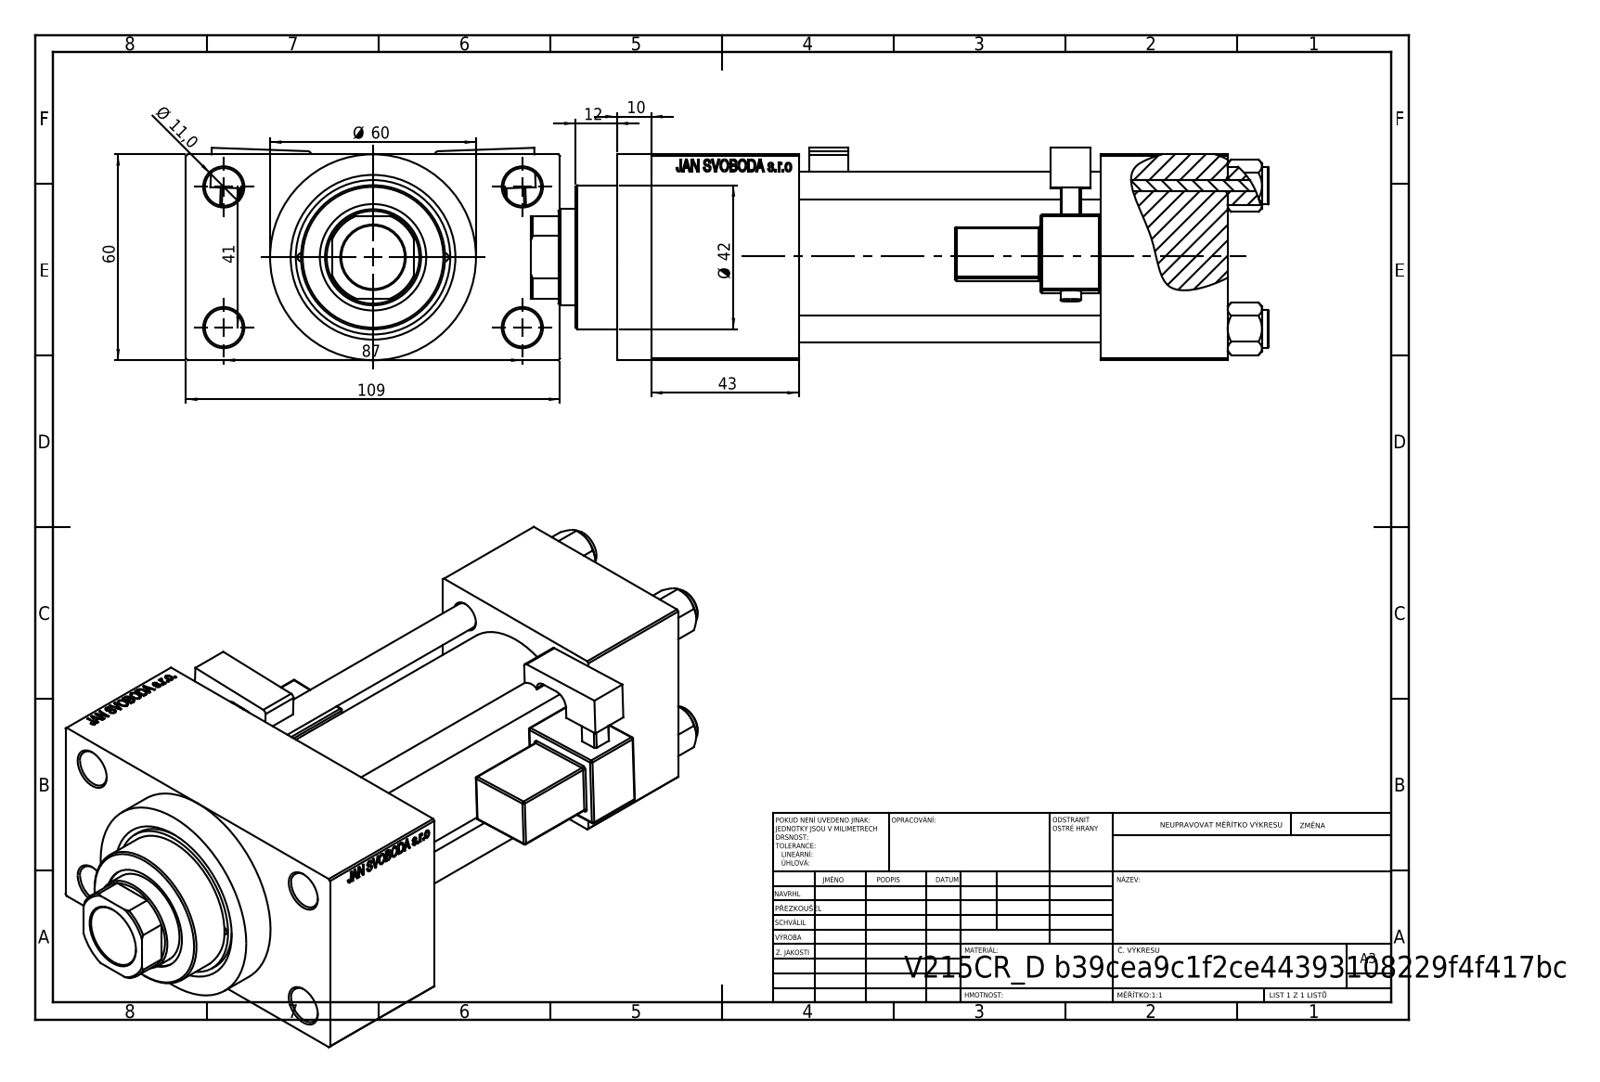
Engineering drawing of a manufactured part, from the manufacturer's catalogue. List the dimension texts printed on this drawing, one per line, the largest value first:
109
87
60
Ø 60
43
Ø 42
41
12
Ø 11,0
10
